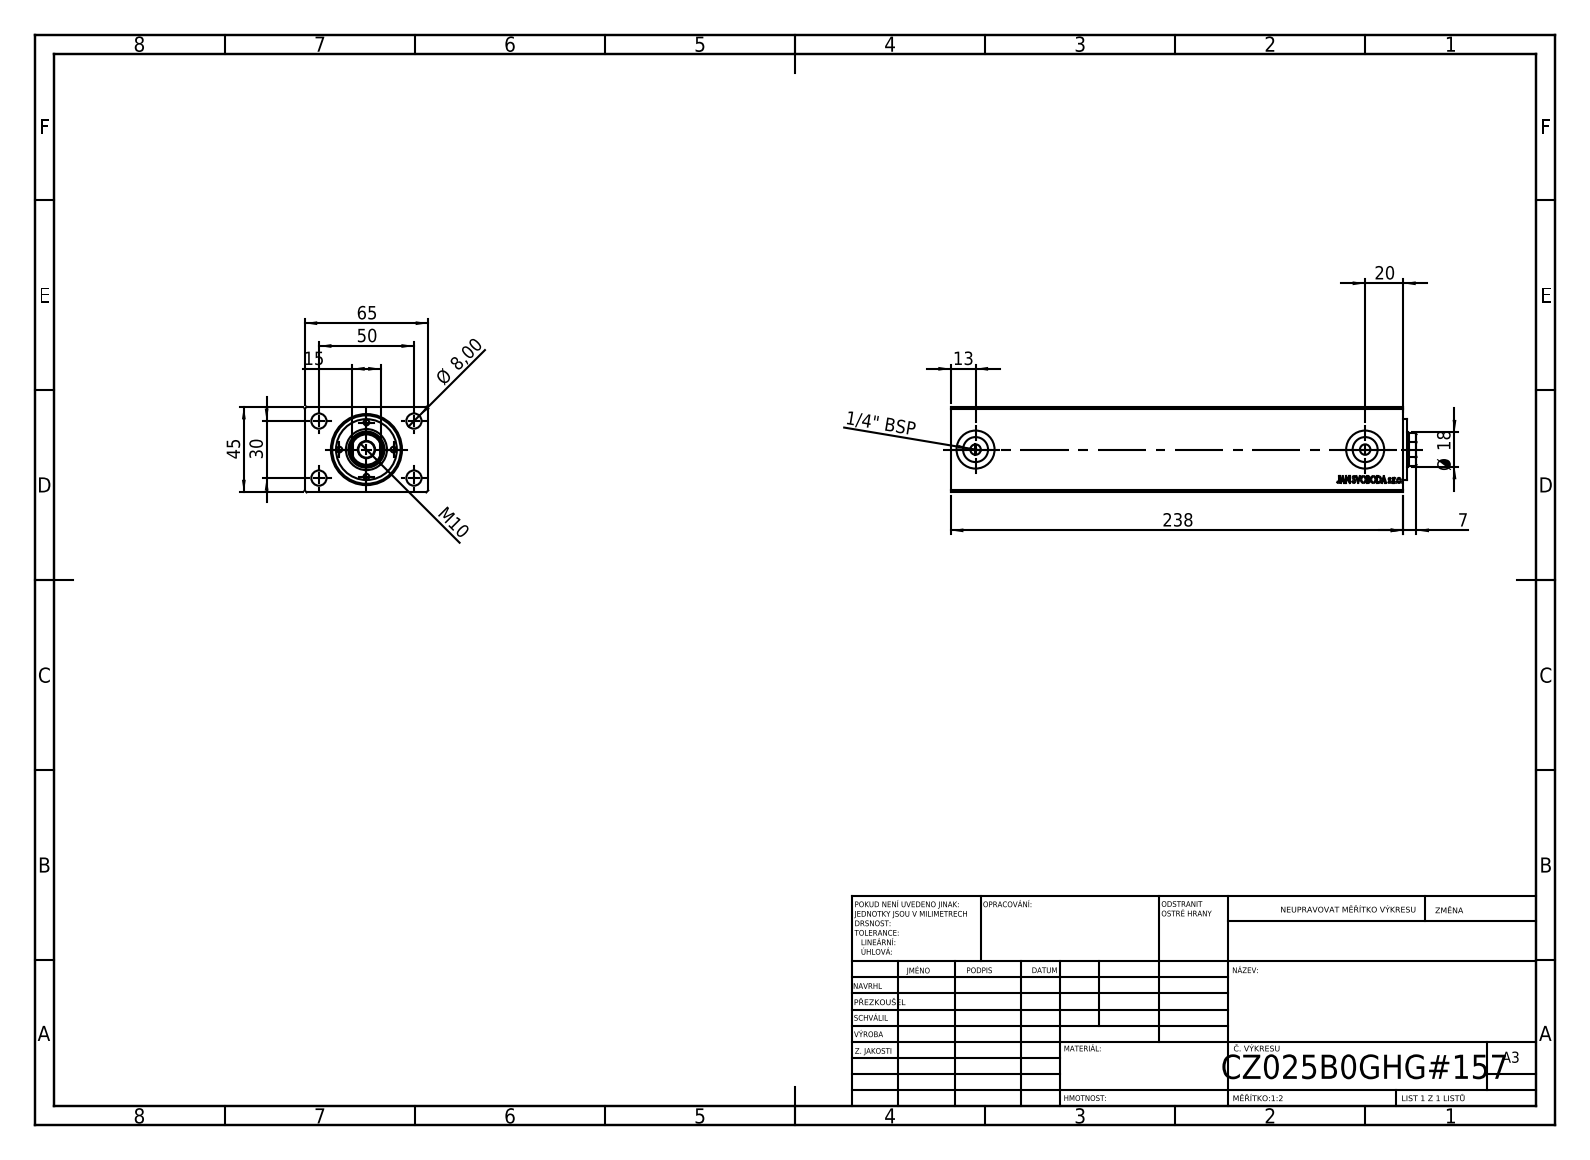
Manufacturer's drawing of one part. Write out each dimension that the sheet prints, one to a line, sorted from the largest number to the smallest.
238
65
50
45
30
20
Ø 18
15
13
M10
Ø 8,00
7
1/4" BSP
